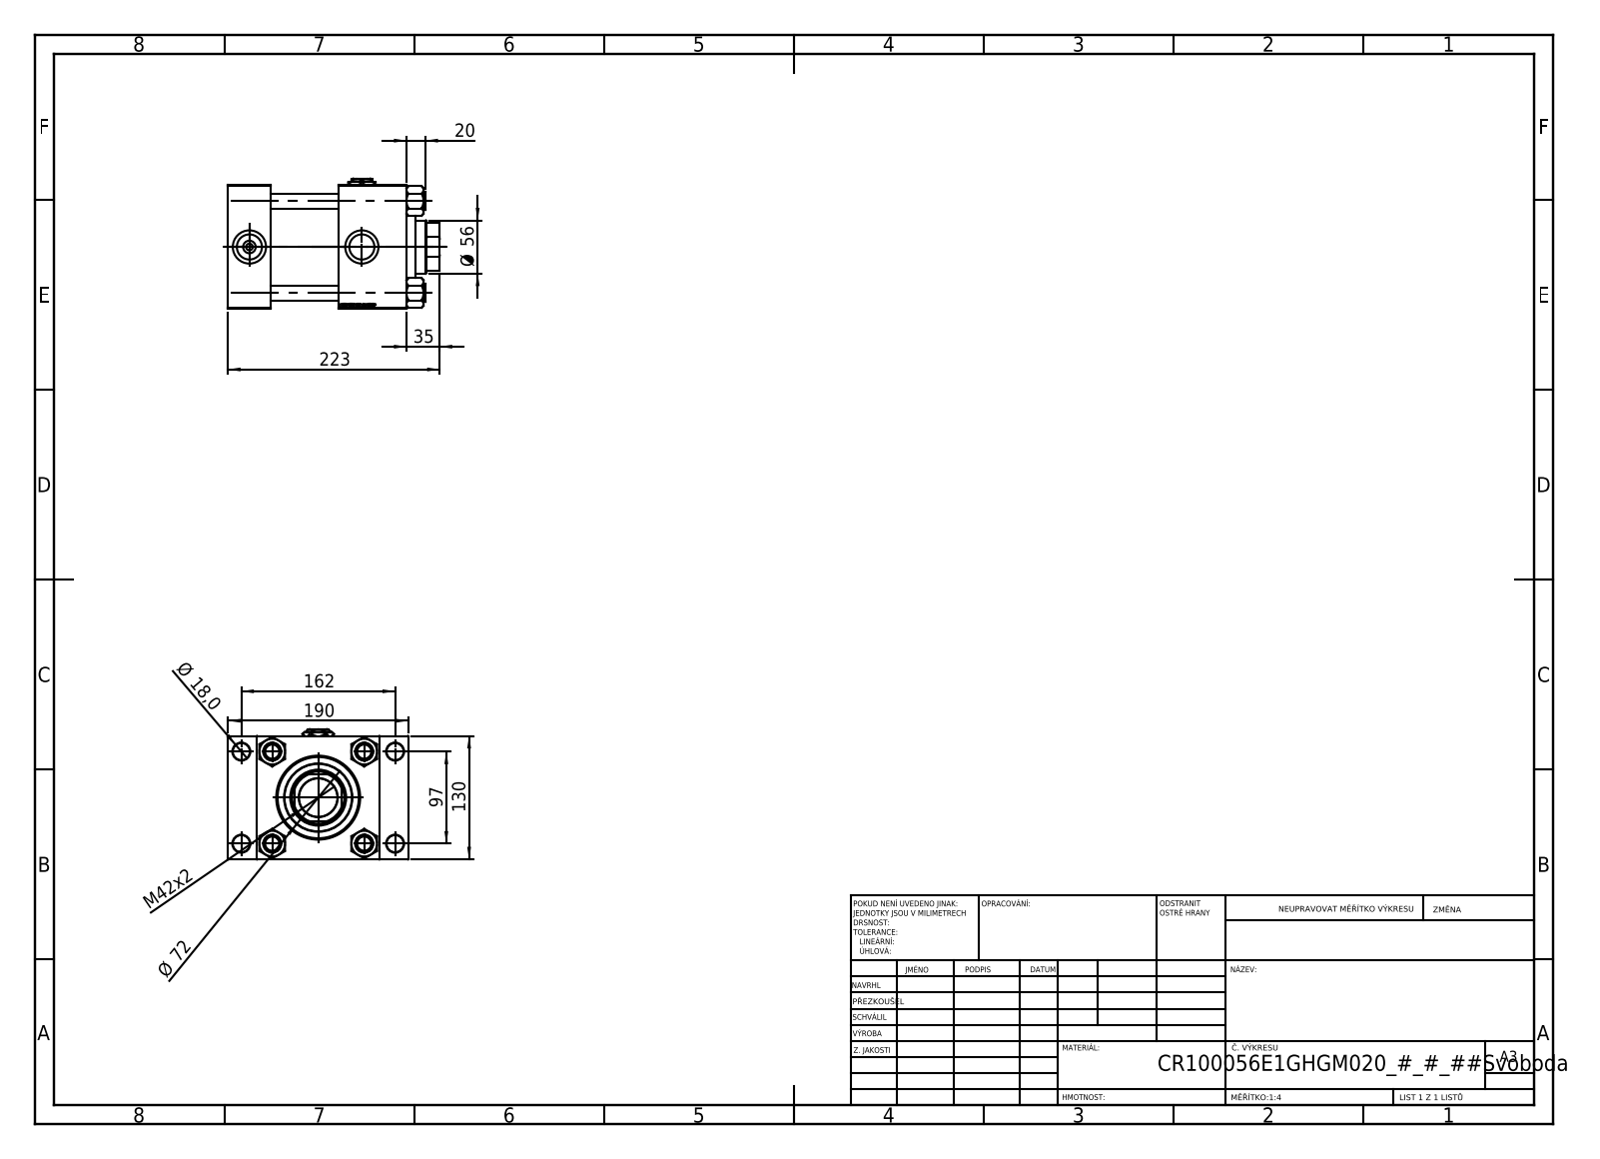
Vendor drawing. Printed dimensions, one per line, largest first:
223
190
162
130
97
Ø 72
Ø 56
M42x2
35
20
Ø 18,0
